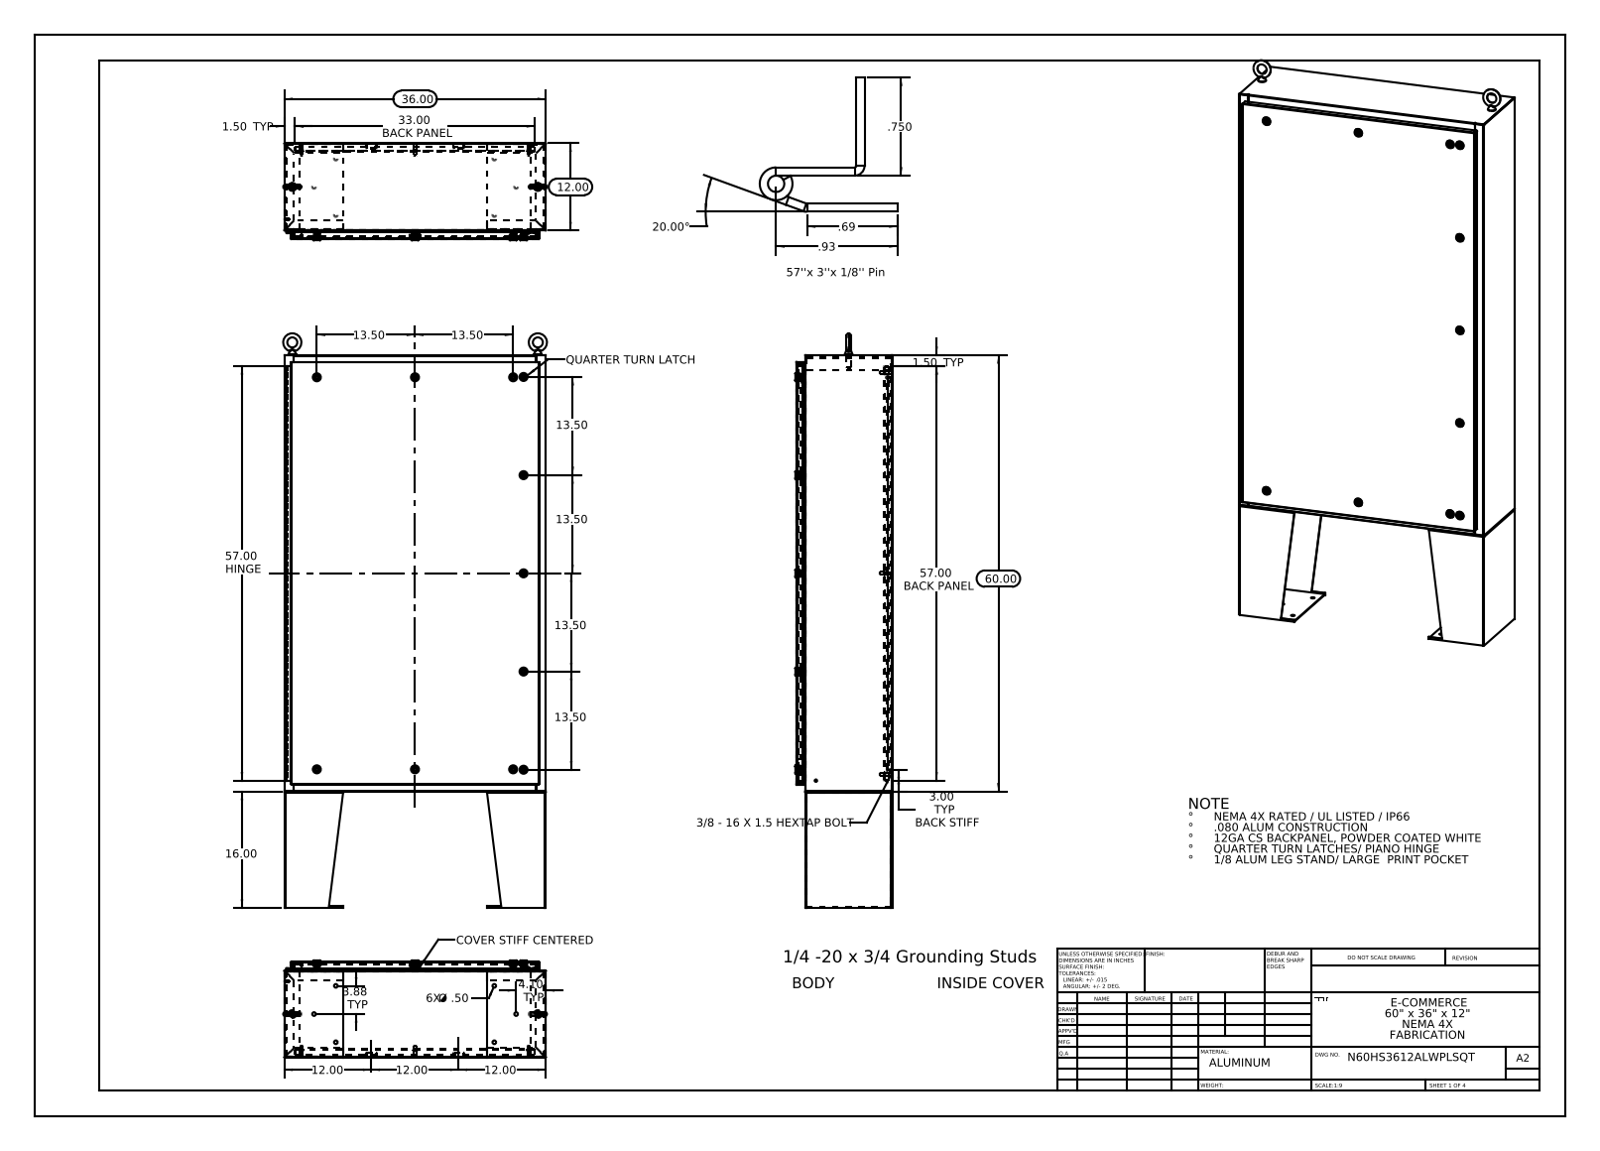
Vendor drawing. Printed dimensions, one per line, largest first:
60.00
57.00 HINGE
57.00 BACK PANEL
36.00
33.00 BACK PANEL
20.00°
16.00
13.50
13.50
13.50
13.50
13.50
13.50
12.00
12.00
12.00
12.00
4.10 TYP
3.88 TYP
3.00 TYP BACK STIFF
1.50 TYP
1.50 TYP
.93
.750
.69
6X Ø .50
